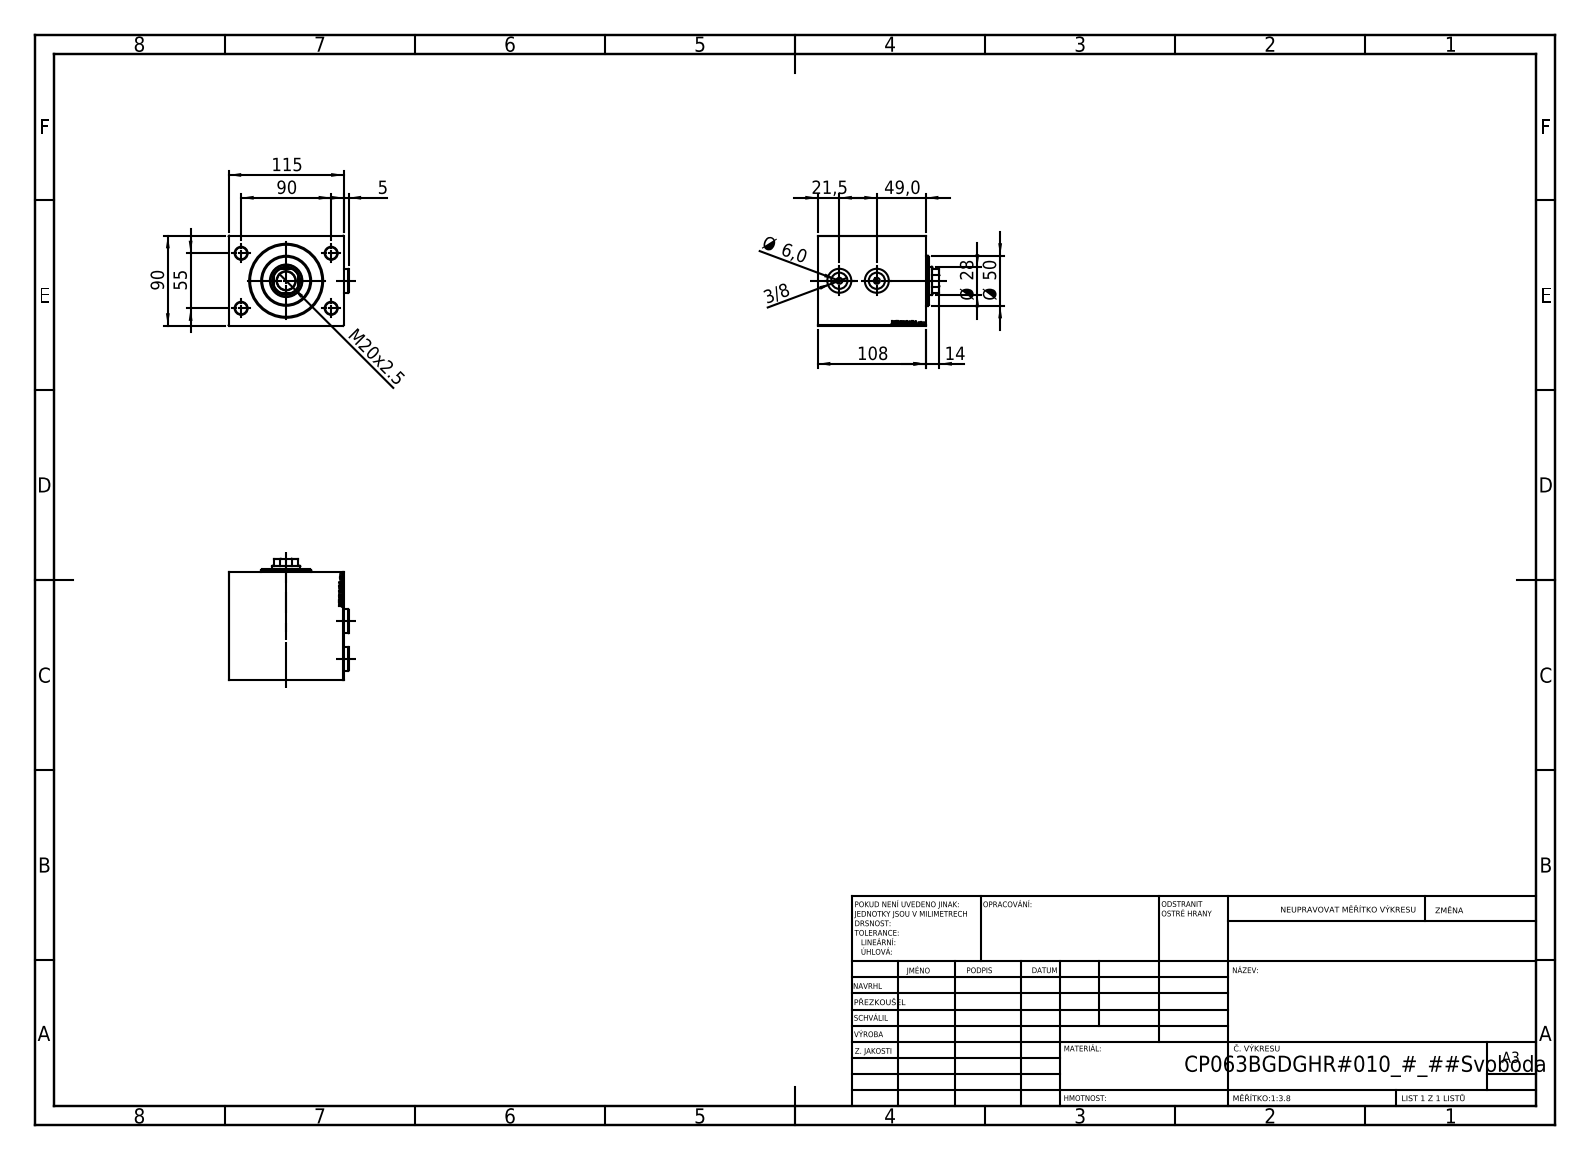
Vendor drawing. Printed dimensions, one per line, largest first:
115
108
90
90
55
Ø 50
49,0
Ø 28
21,5
M20x2.5
14
Ø 6,0
5
3/8
